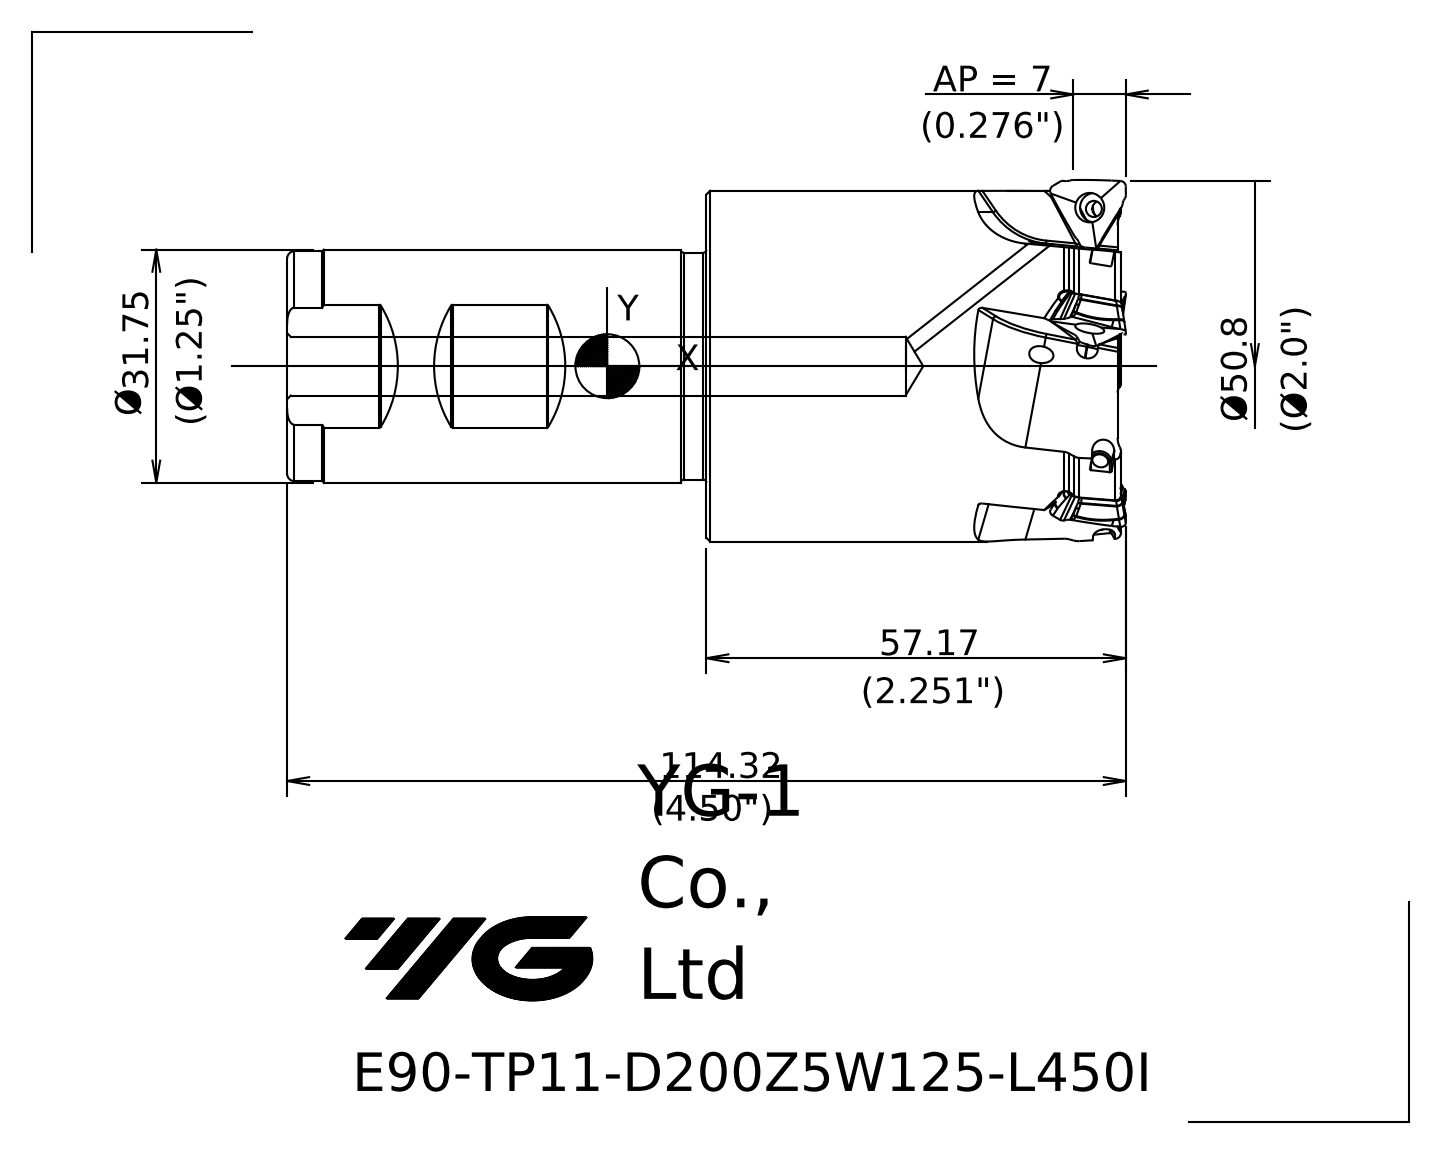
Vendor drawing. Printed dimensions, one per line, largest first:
114.32
57.17
Ø 31.75
AP = 7
